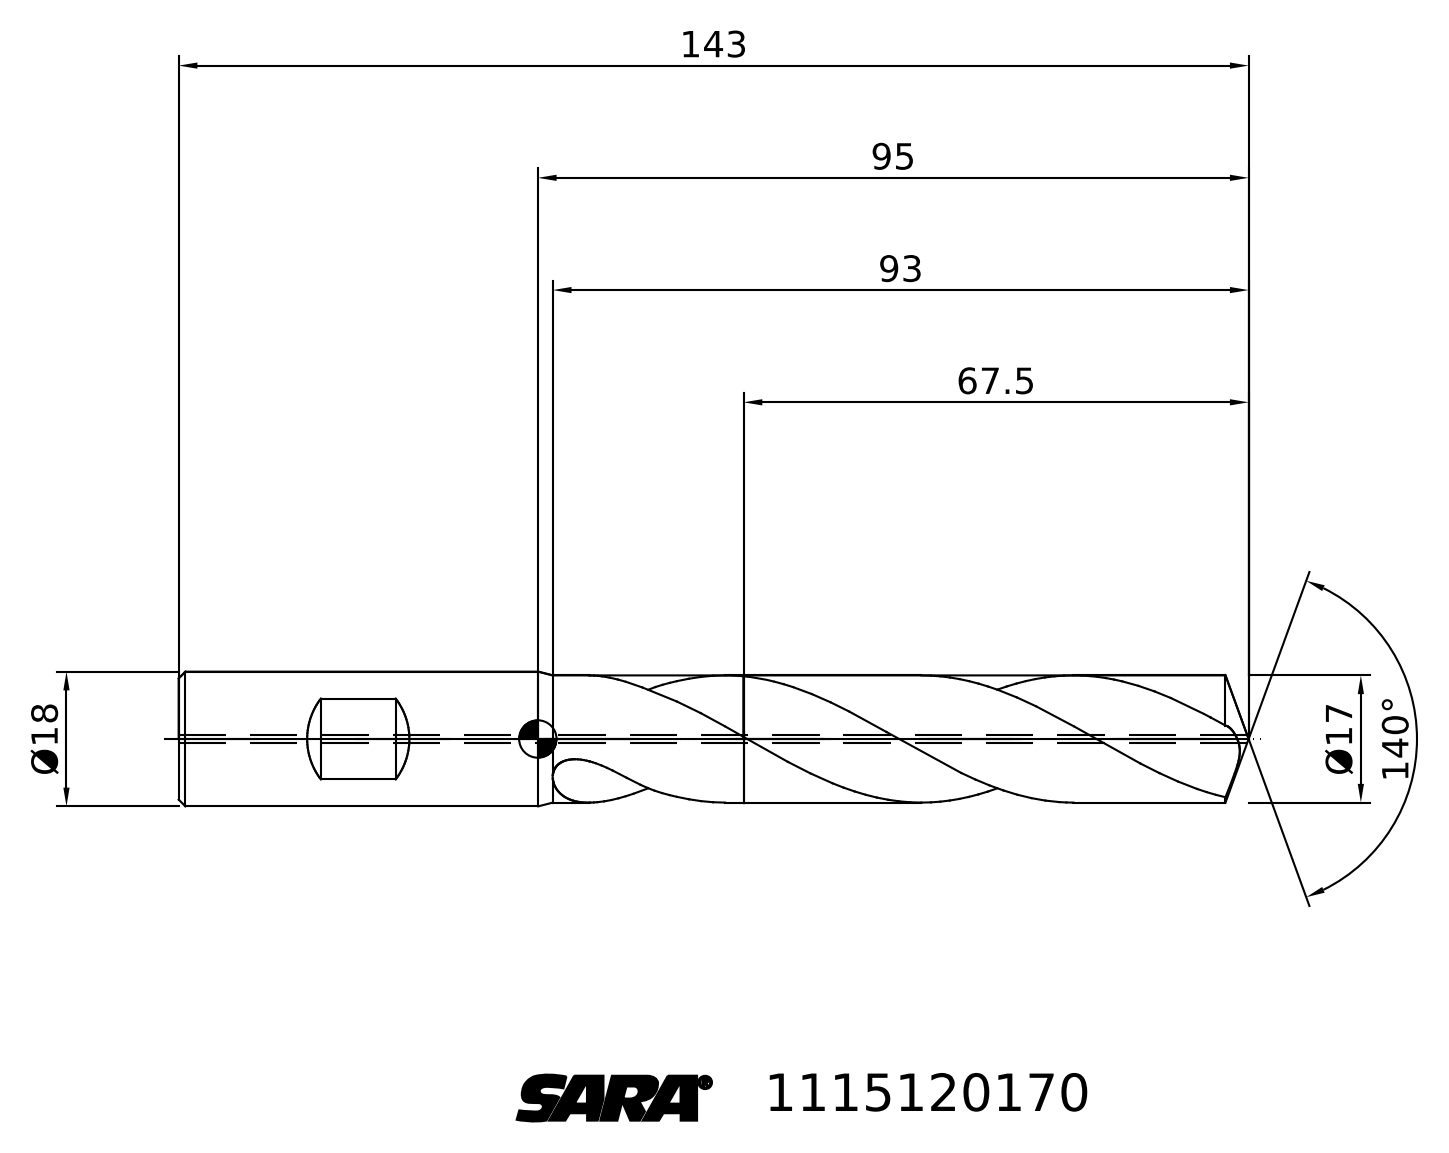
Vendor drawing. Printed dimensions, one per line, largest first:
143
140°
95
93
67.5
Ø18
Ø17
